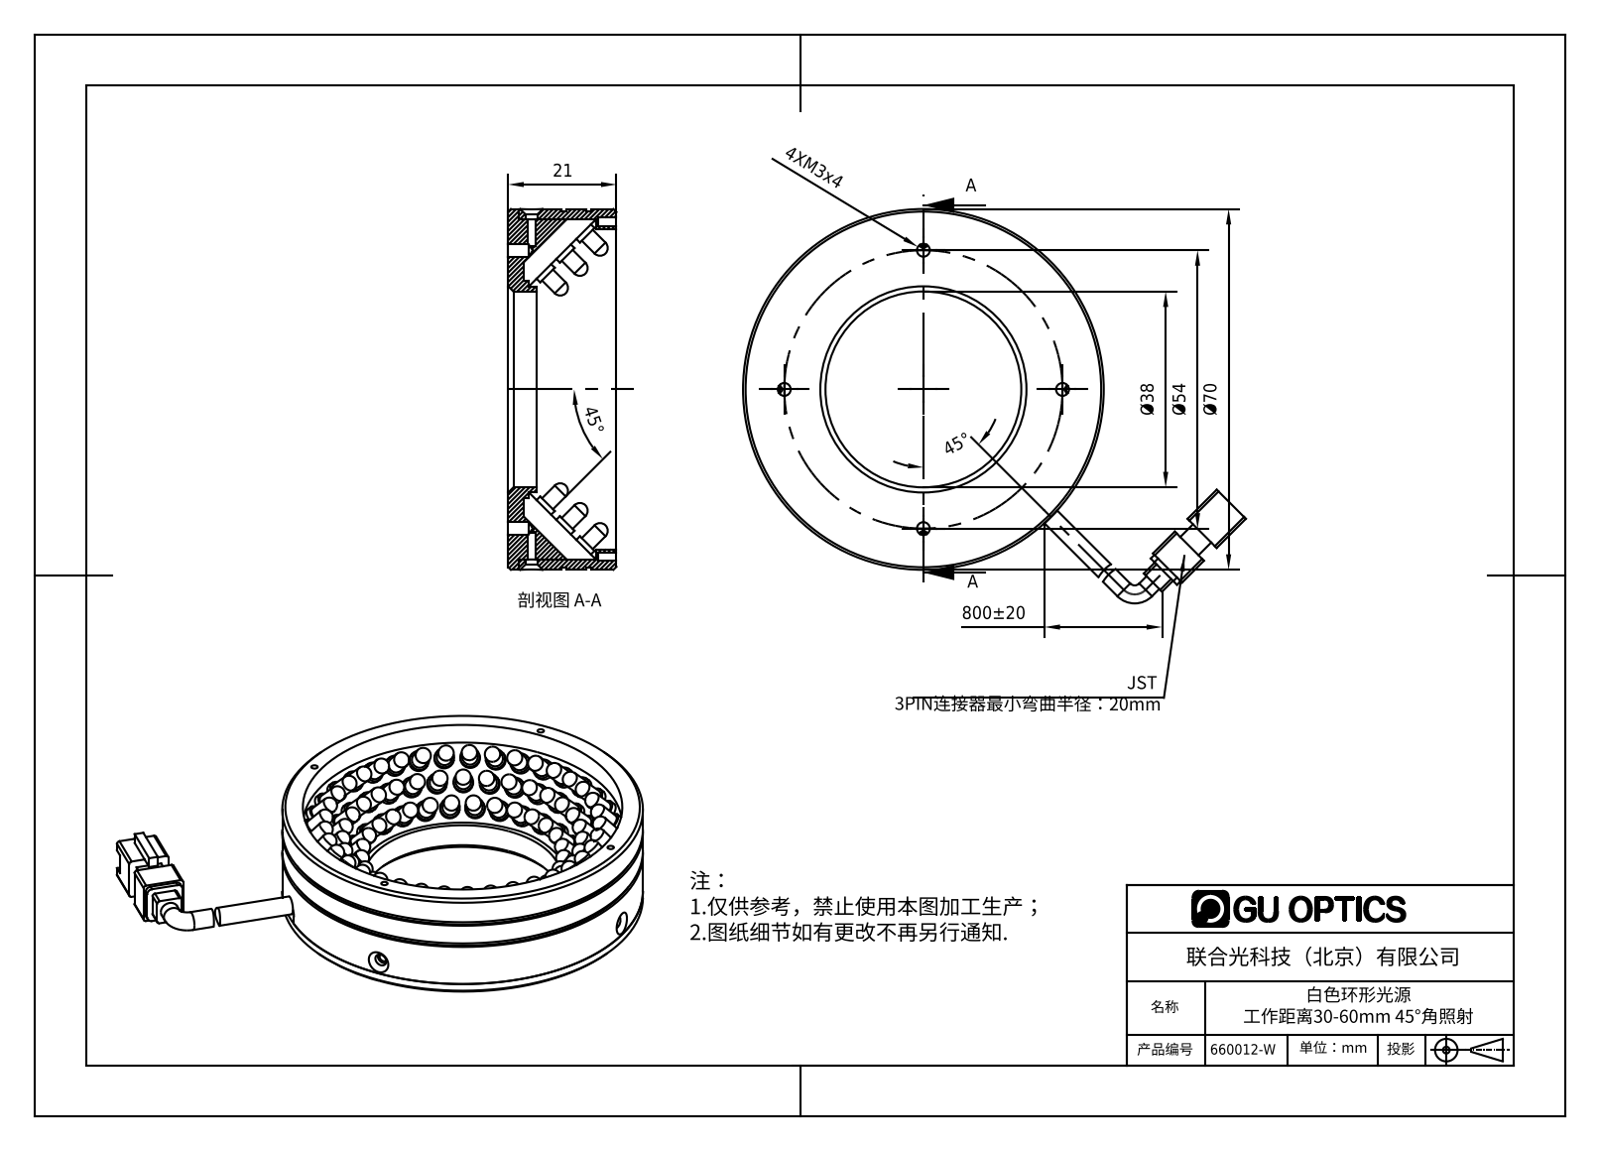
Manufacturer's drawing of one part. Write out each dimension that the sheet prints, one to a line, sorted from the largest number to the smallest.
800±20
Ø70
Ø54
45°
45°
Ø38
21
4XM3x4
